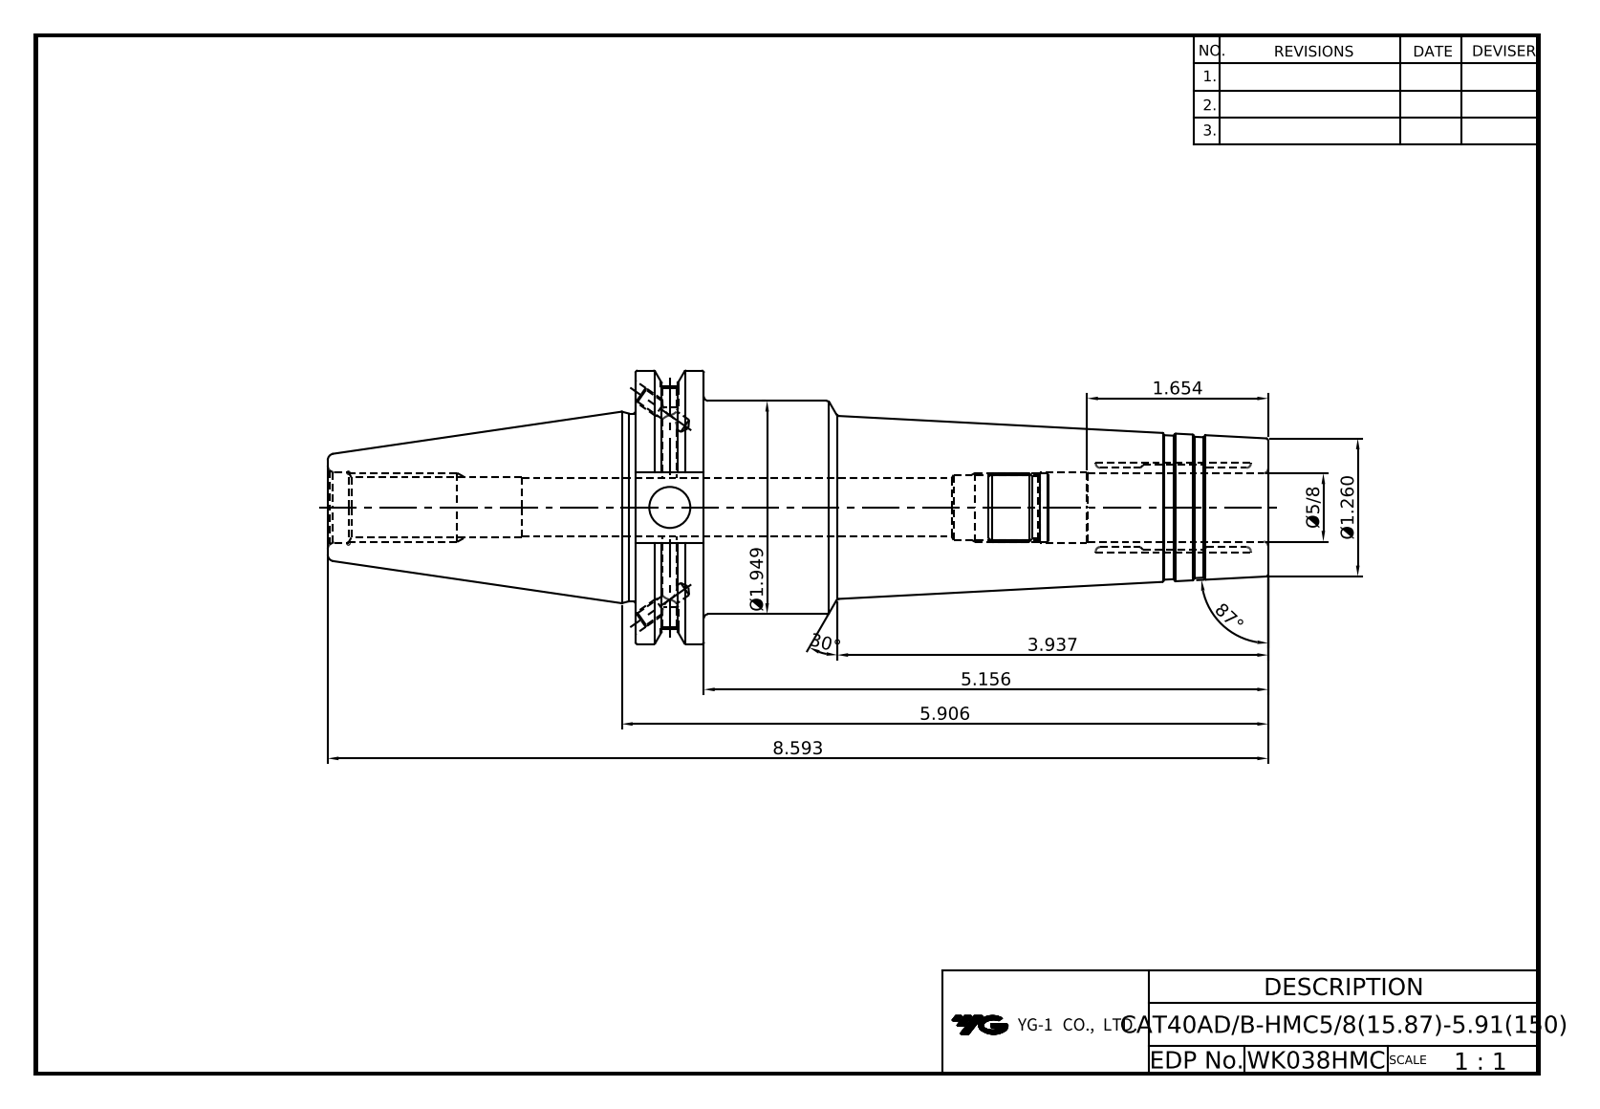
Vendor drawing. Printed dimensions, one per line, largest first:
87°
30°
8.593
5.906
5.156
3.937
Ø1.949
1.654
Ø1.260
Ø5/8
